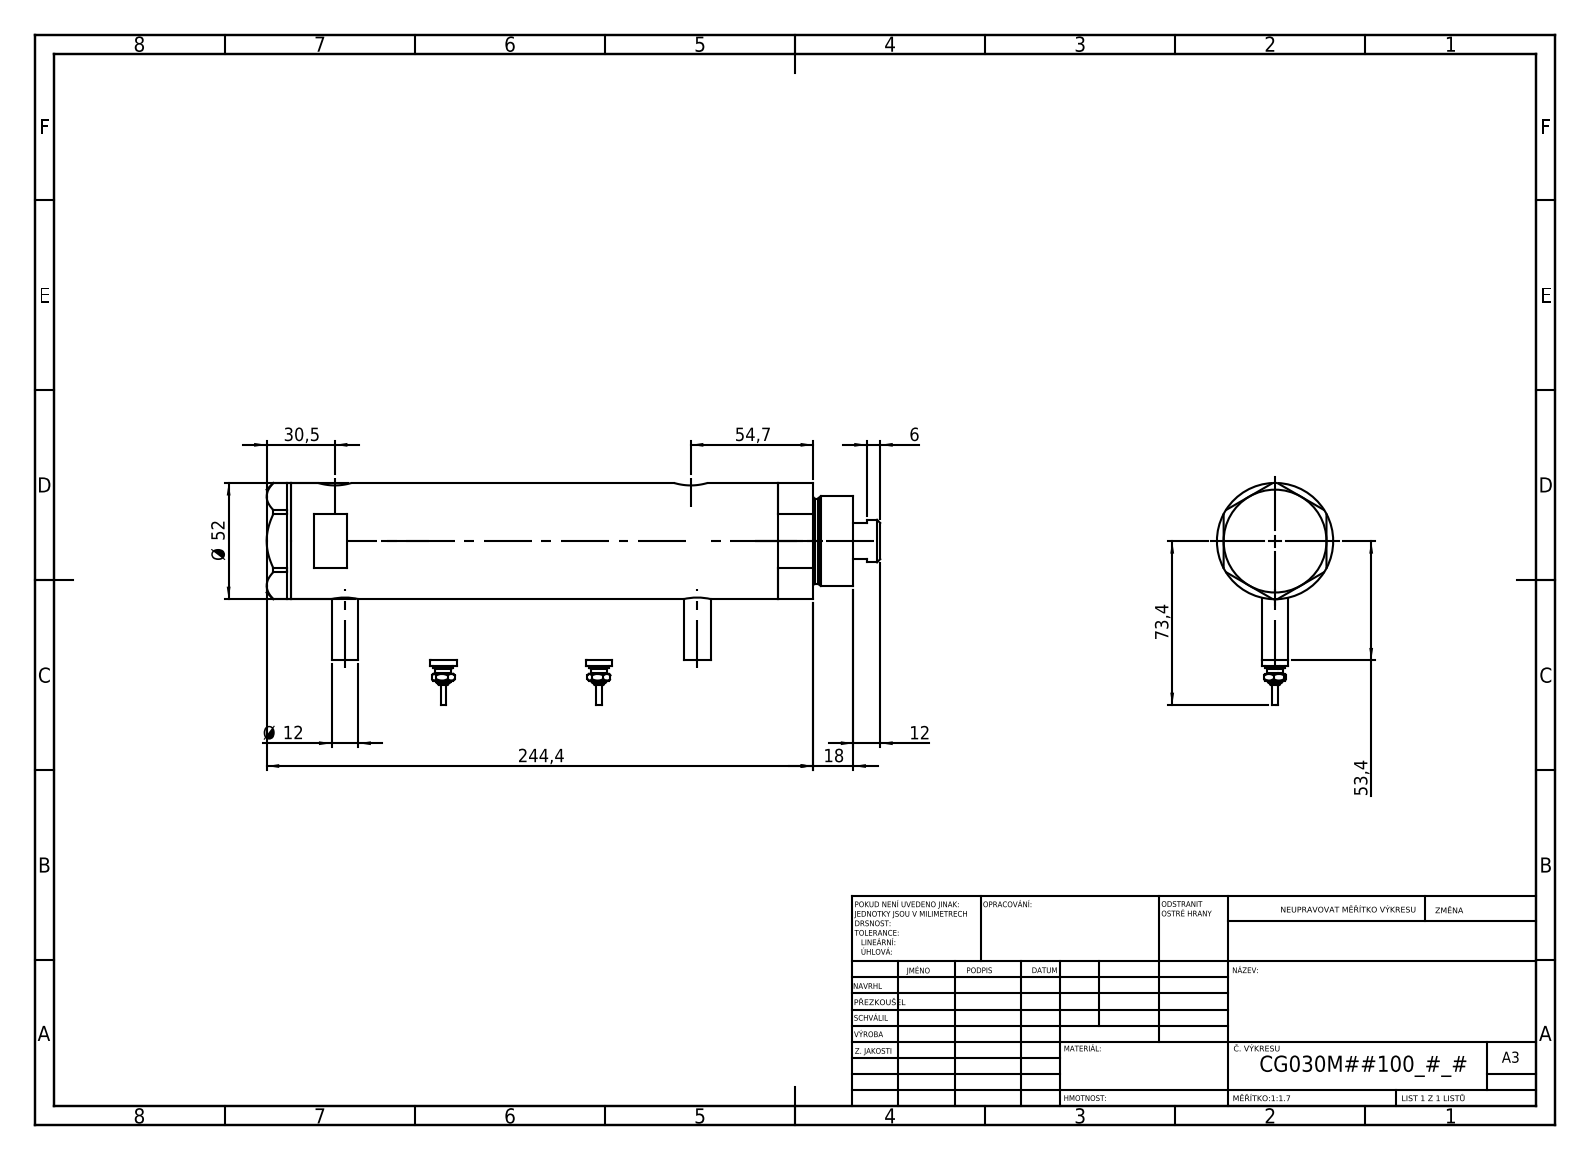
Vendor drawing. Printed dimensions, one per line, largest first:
244,4
73,4
54,7
53,4
Ø 52
30,5
18
12
Ø 12
6
